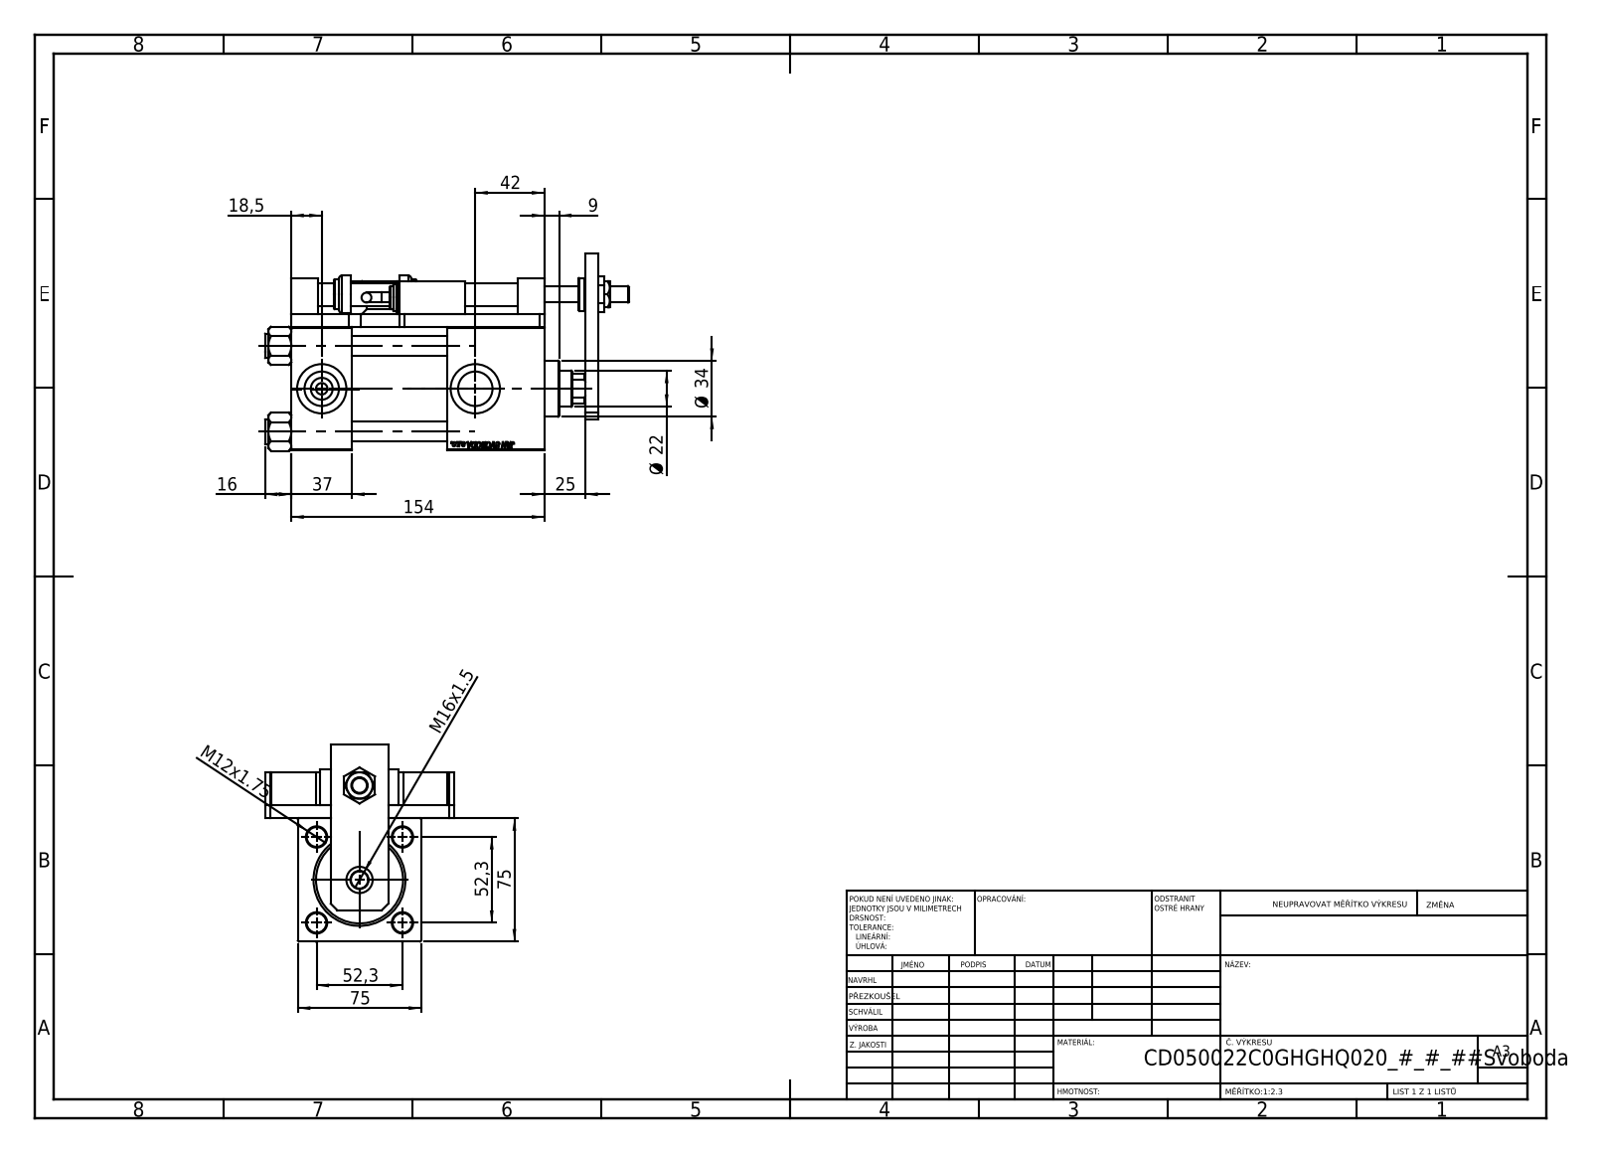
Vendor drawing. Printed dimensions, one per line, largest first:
154
75
75
52,3
52,3
42
37
Ø 34
25
Ø 22
18,5
16
M16x1.5
M12x1.75
9
